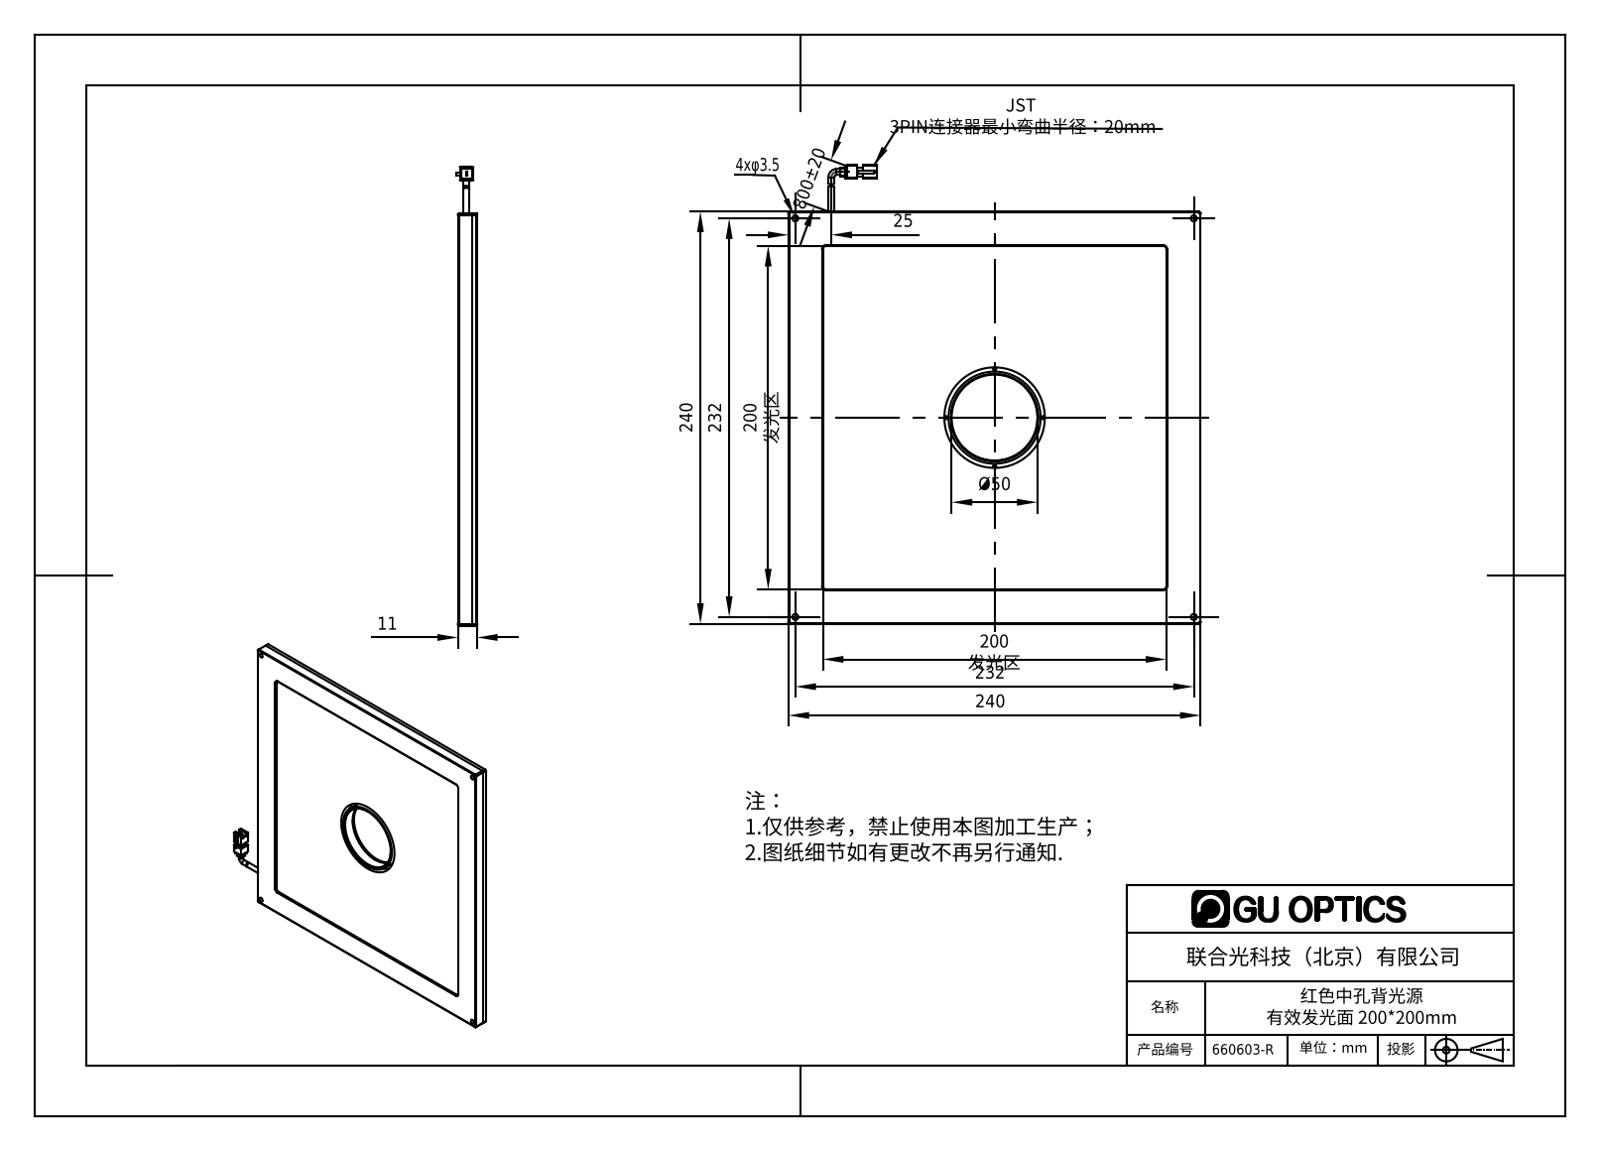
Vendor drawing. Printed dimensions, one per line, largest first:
800±20
240
240
232
232
200 发光区
200 发光区
Ø50
25
11
